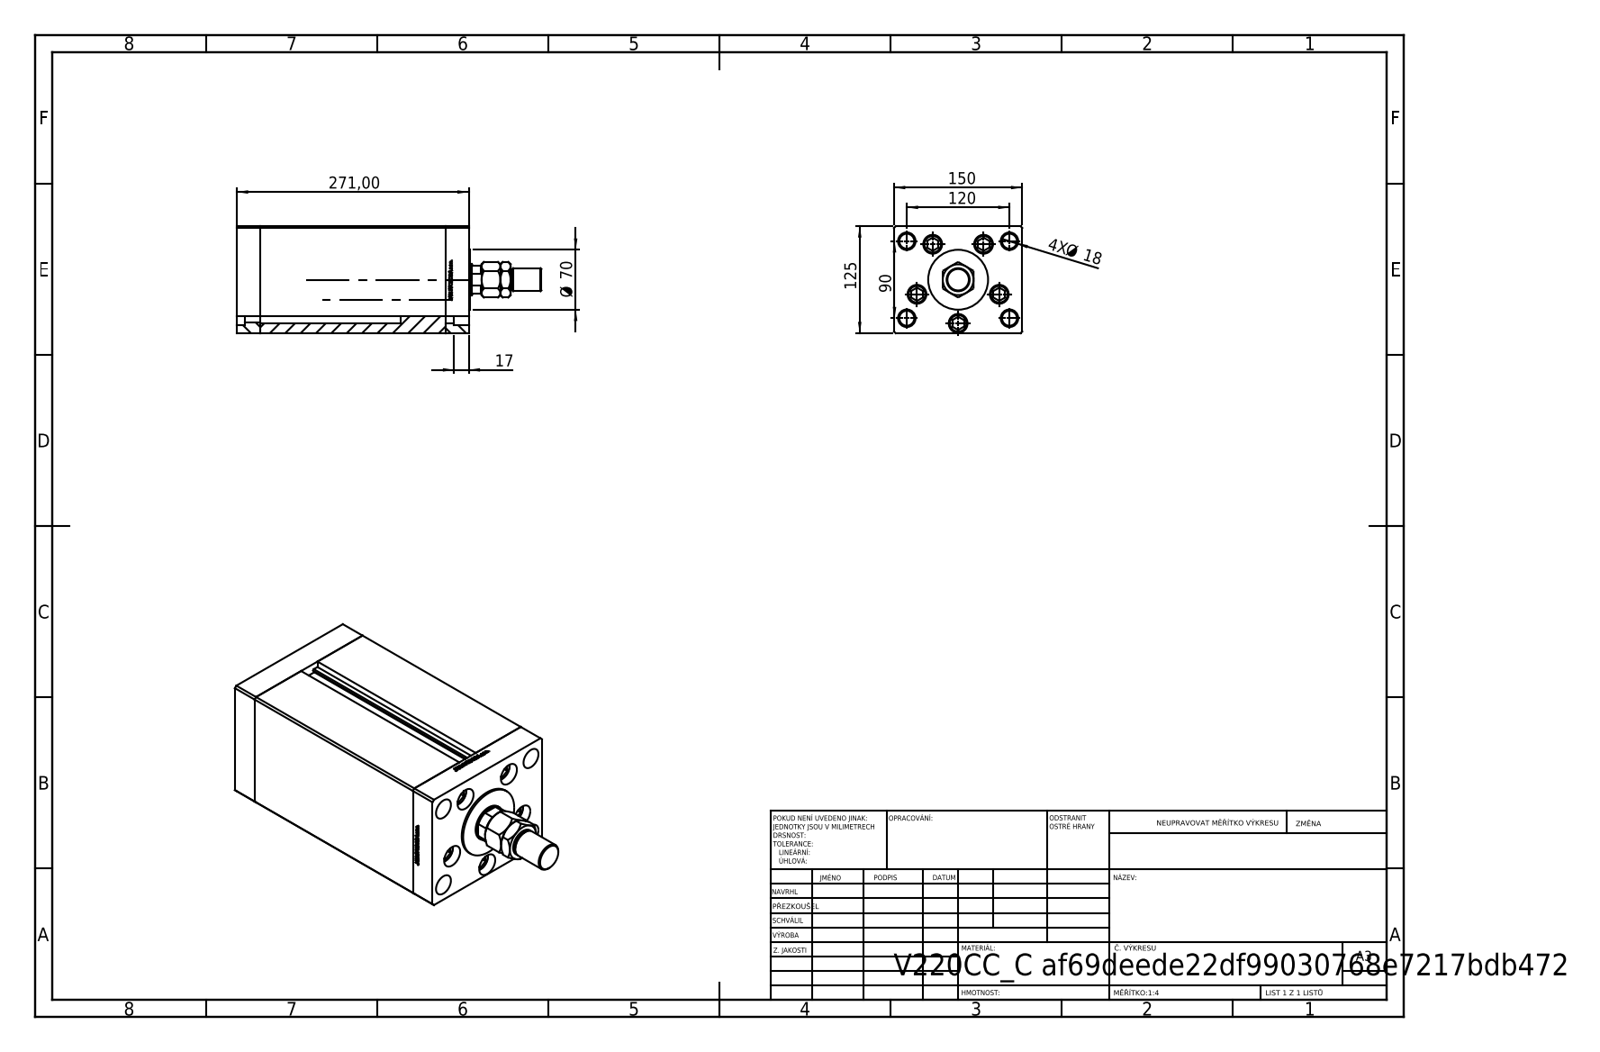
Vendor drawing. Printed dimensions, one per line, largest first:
271,00
150
125
120
90
Ø 70
4X Ø 18
17
